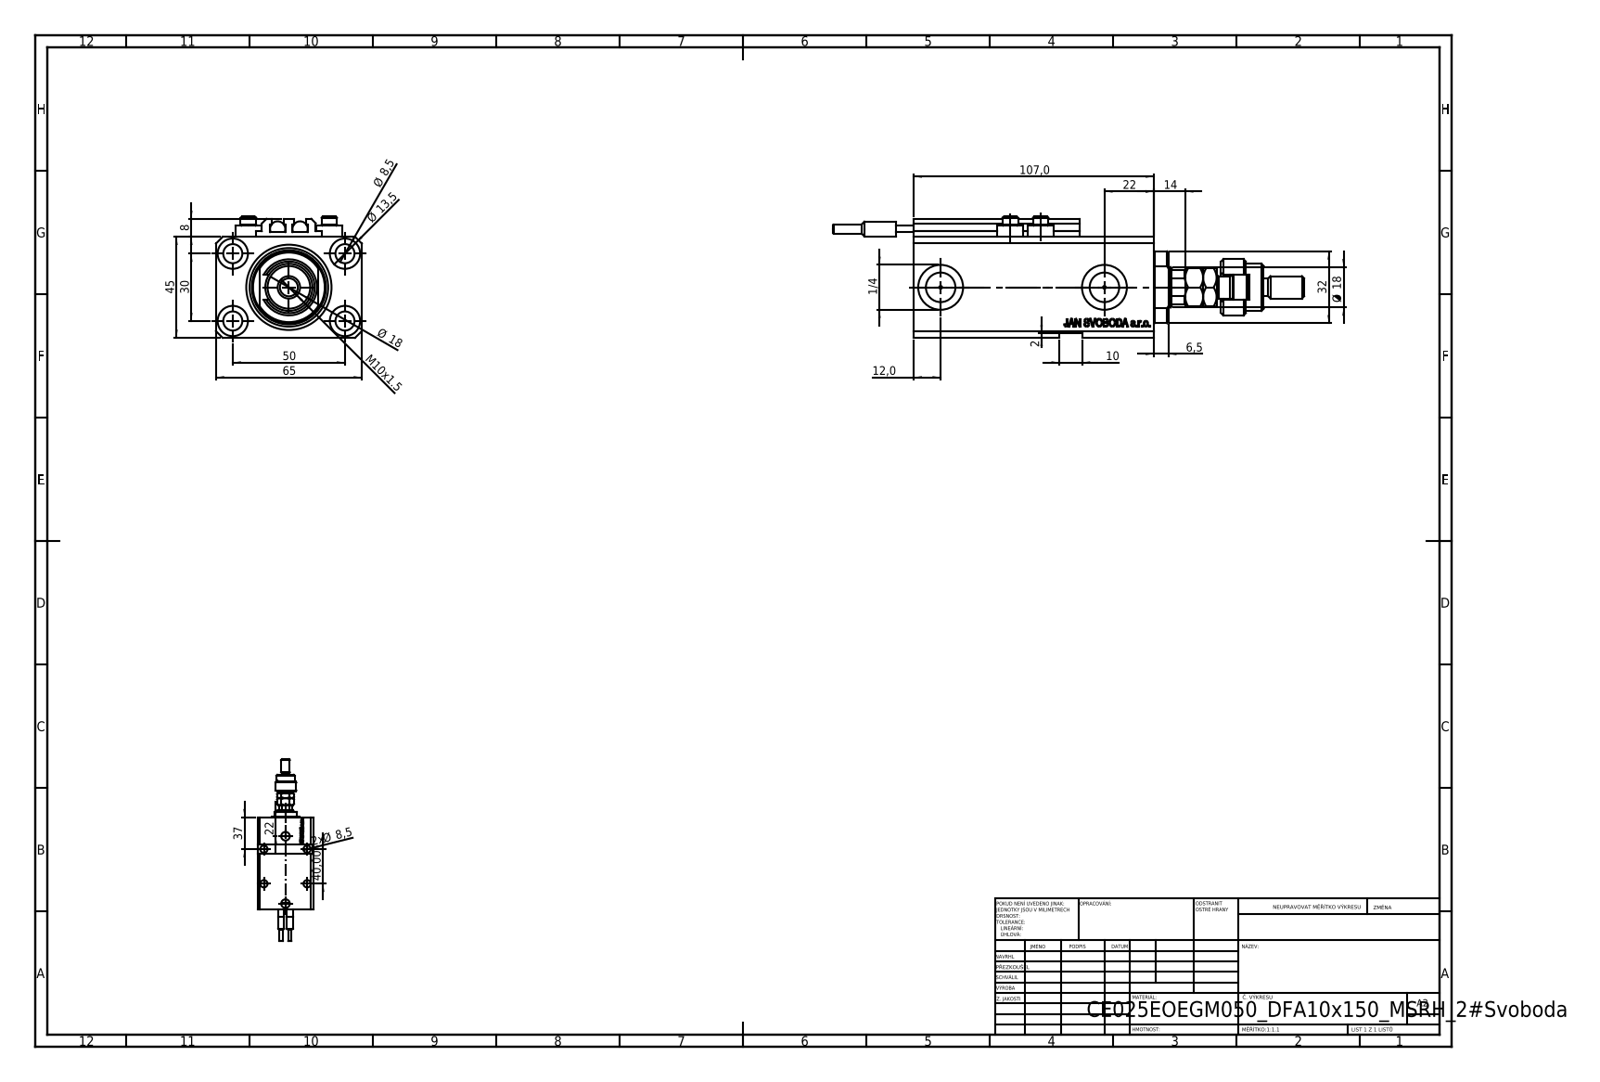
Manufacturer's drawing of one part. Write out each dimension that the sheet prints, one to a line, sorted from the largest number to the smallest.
107,0
65
50
45
40,00
37
32
30
22
22
Ø 18
Ø 18
14
Ø 13,5
12,0
M10x1.5
10
Ø 8,5
2x Ø 8,5
8
6,5
2
1/4
